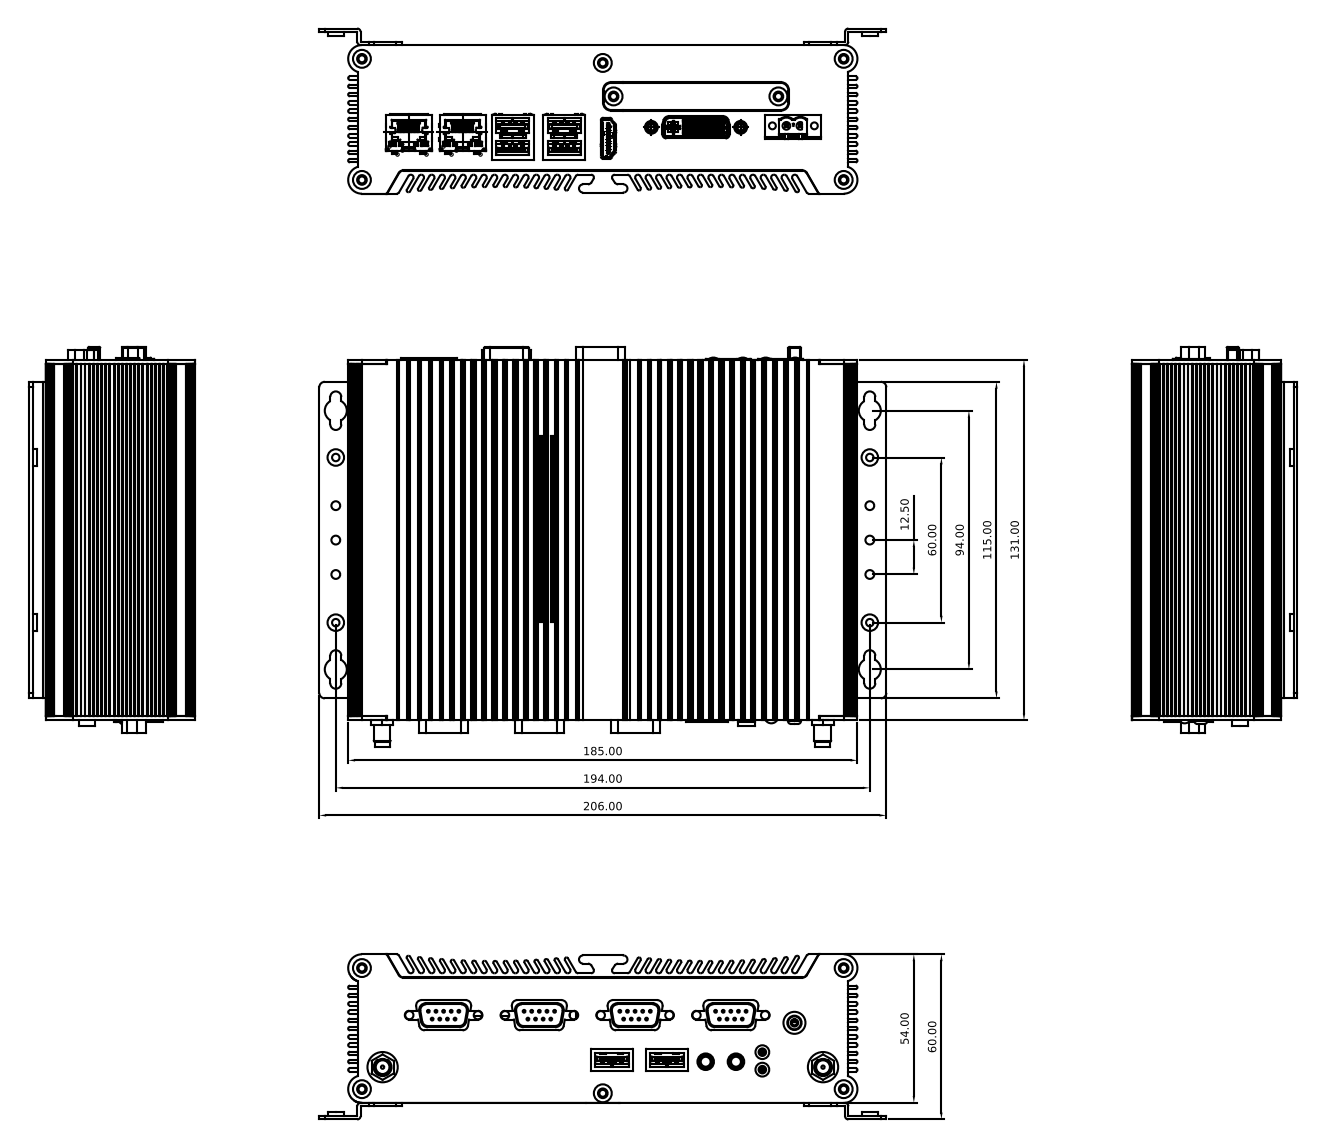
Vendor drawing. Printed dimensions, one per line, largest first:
206.00
194.00
185.00
131.00
115.00
94.00
60.00
60.00
54.00
12.50
